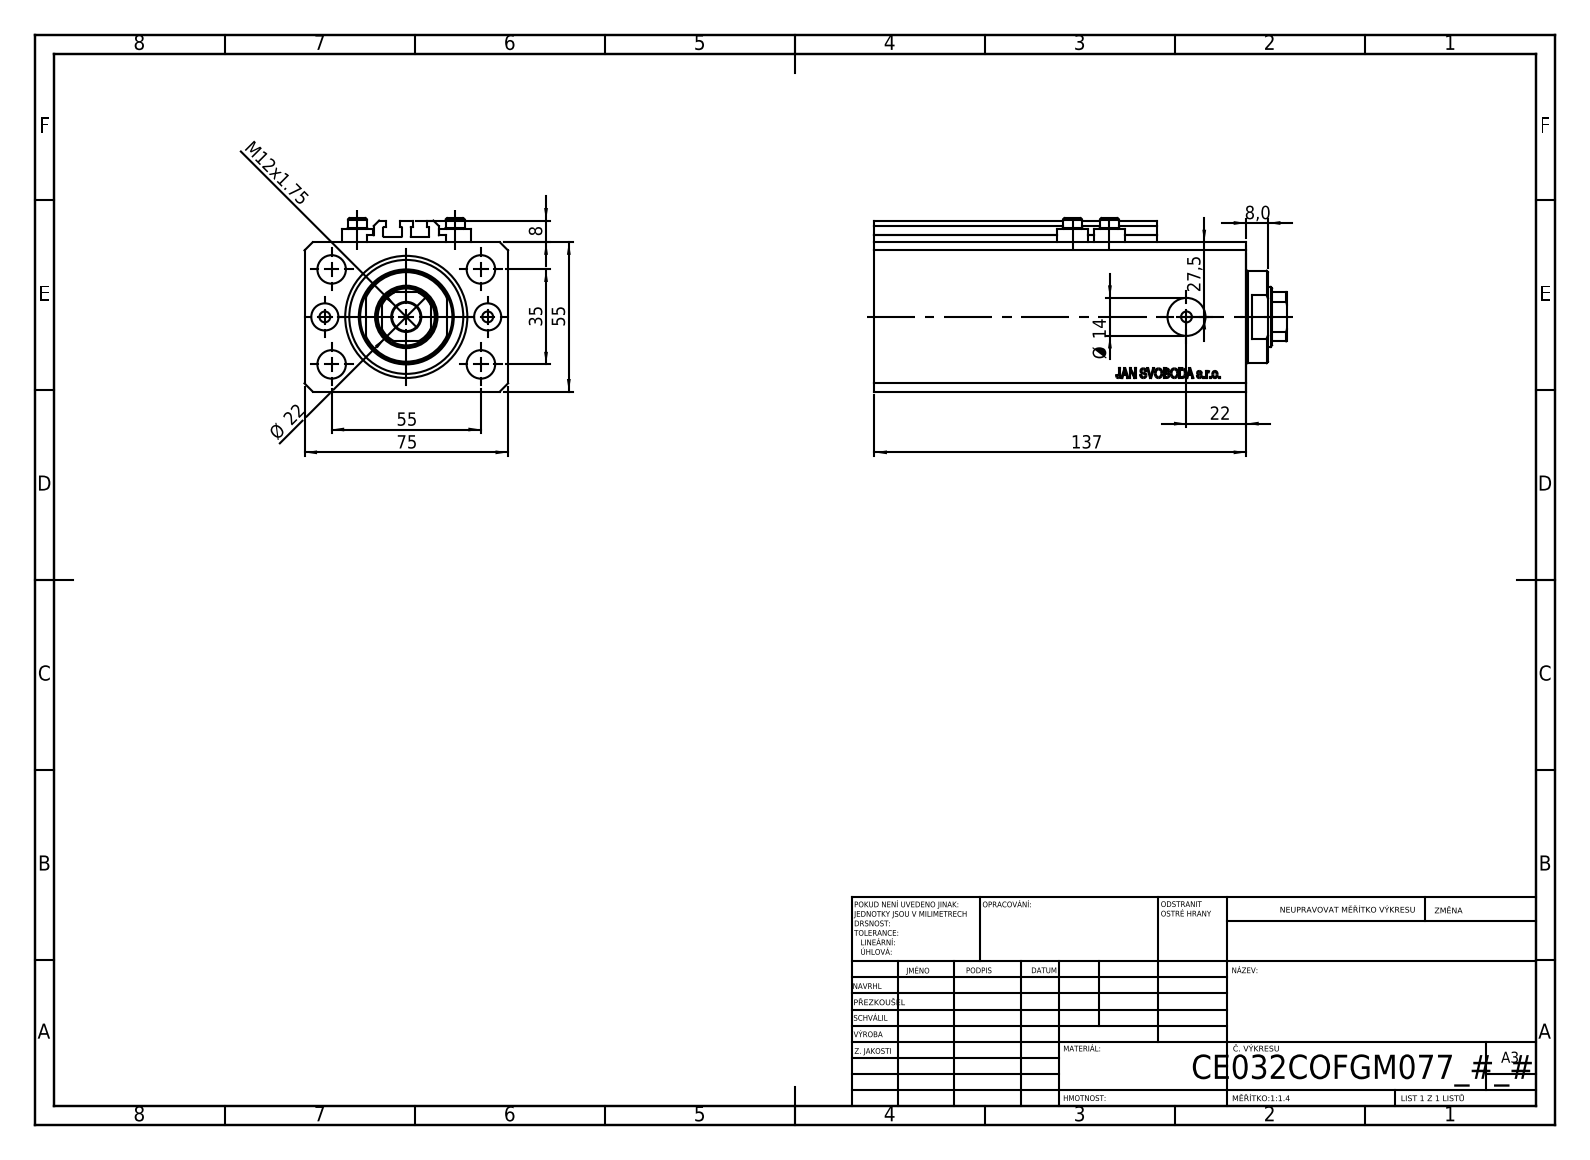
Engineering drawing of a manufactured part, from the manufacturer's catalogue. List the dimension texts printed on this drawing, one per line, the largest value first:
137
75
55
55
35
27,5
Ø 22
22
Ø 14
M12x1.75
8
8,0
